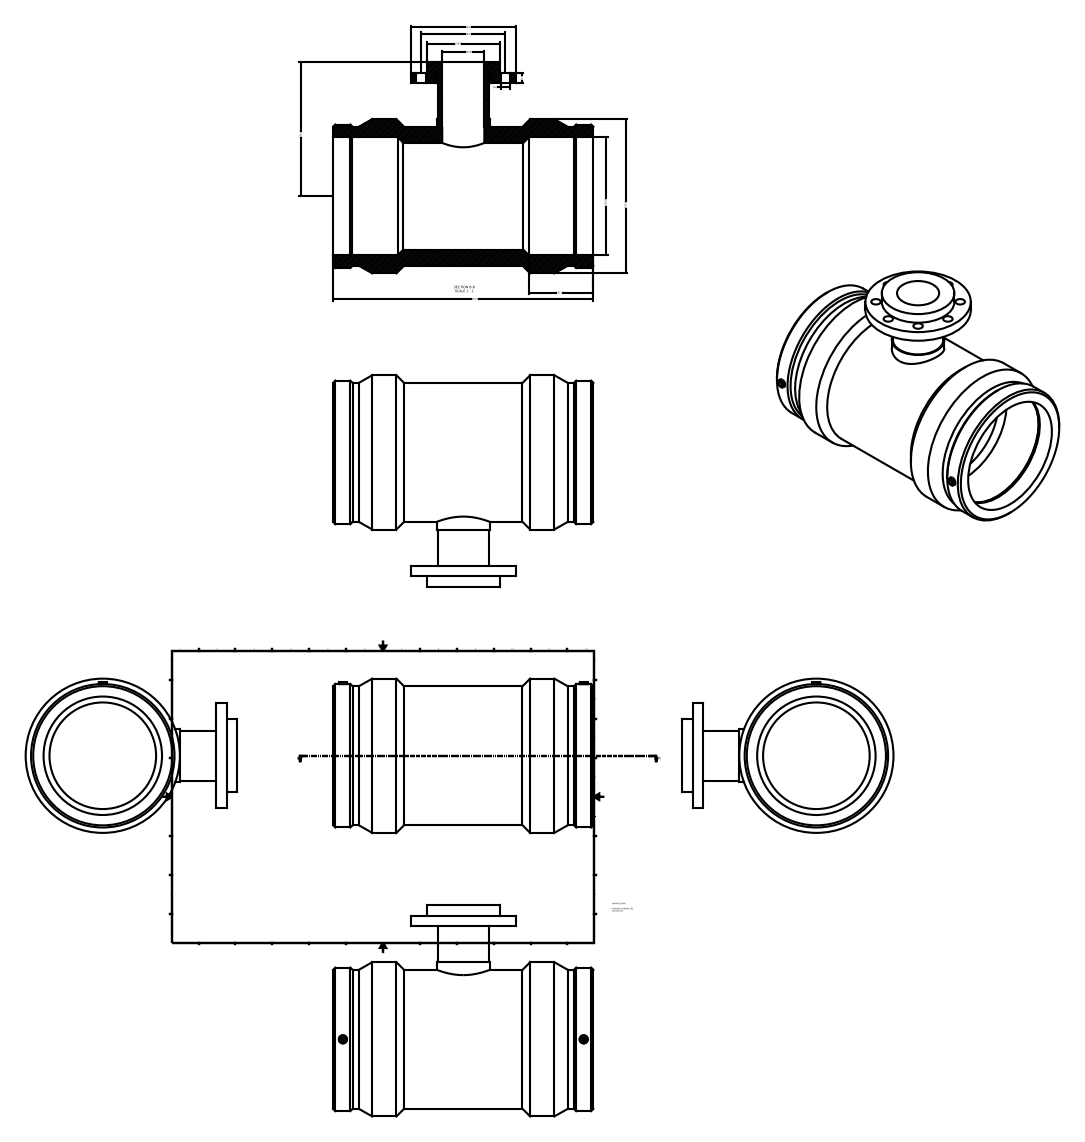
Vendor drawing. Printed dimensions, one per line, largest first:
494.00
293.00
255.00
n225.00
200.00
160.00
138.00
122.00
n80.00
20.00
18.00
